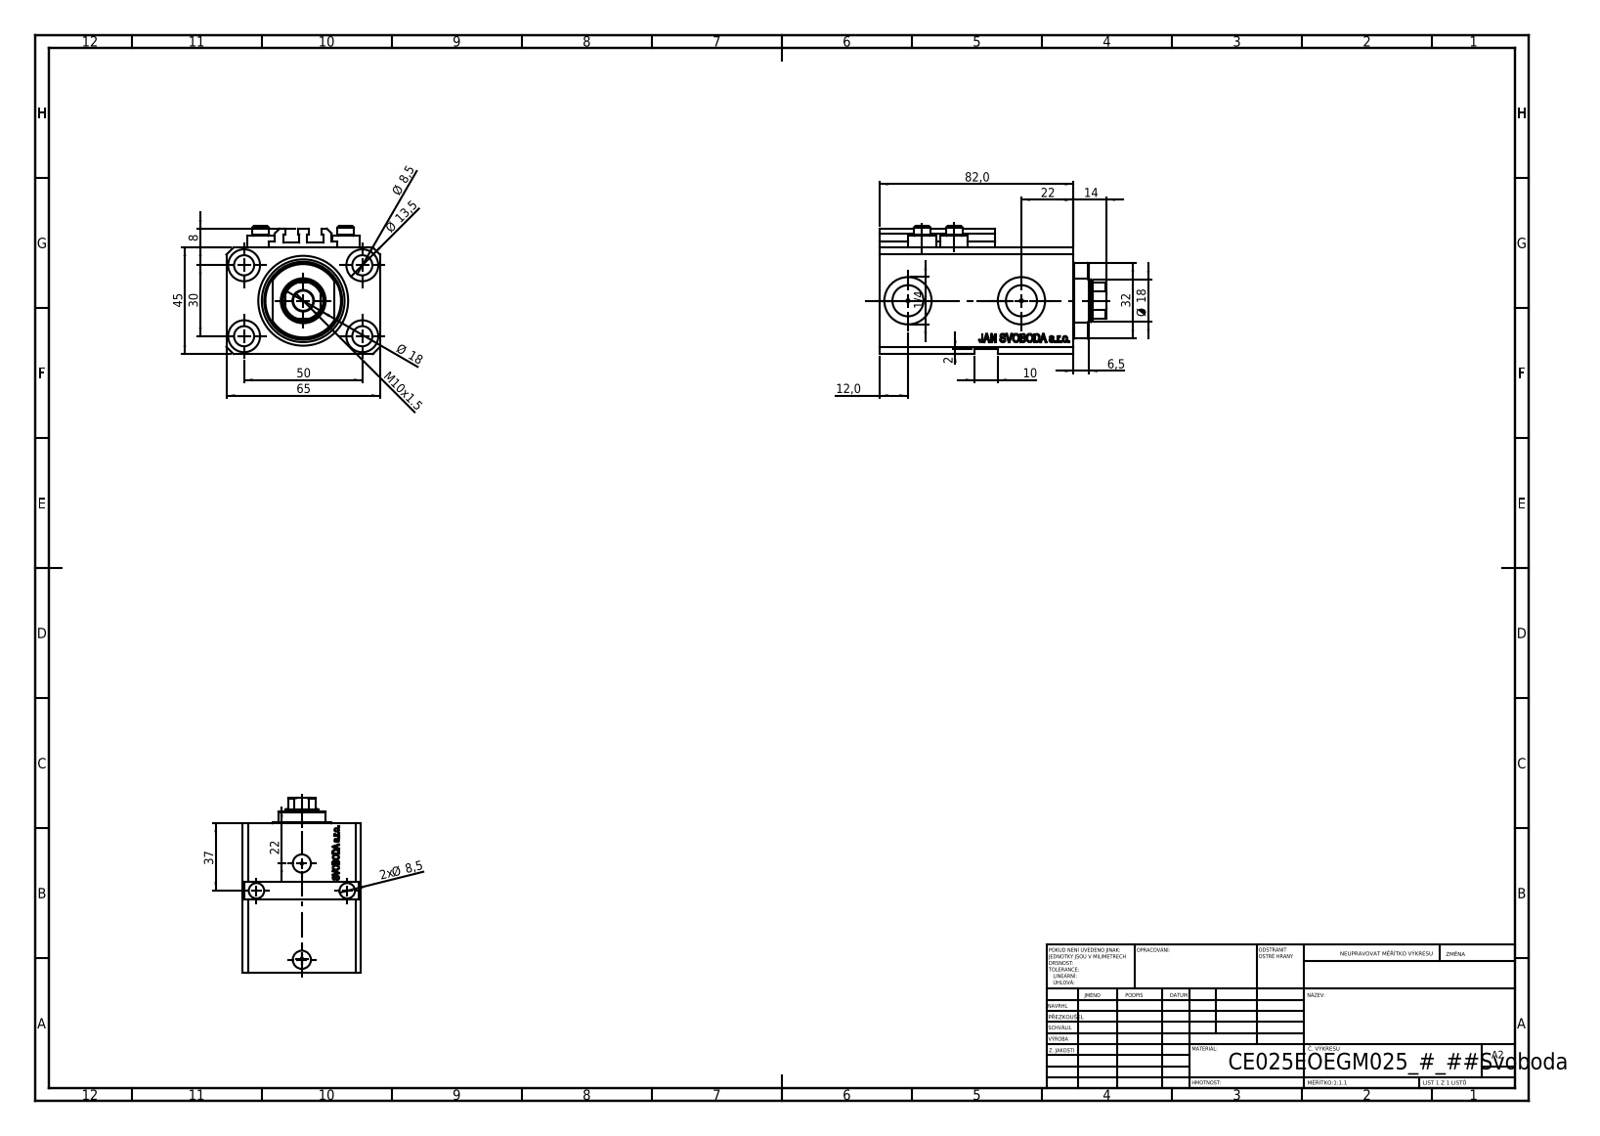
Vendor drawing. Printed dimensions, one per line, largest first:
82,0
65
50
45
37
32
30
22
22
Ø 18
Ø 18
14
Ø 13,5
12,0
M10x1.5
10
Ø 8,5
2x Ø 8,5
8
6,5
2
1/4
